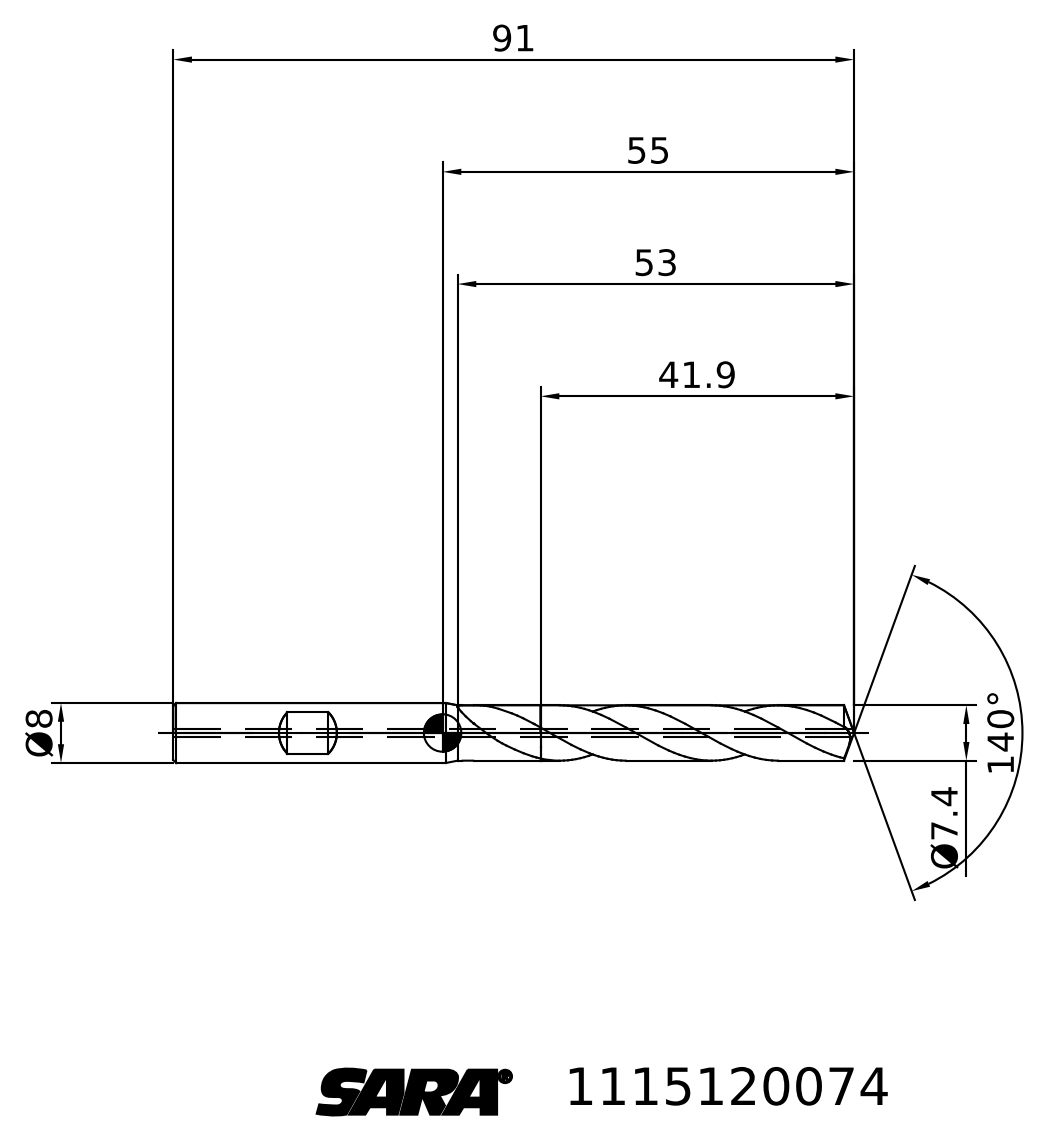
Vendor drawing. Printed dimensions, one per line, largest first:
140°
91
55
53
41.9
Ø8
Ø7.4
